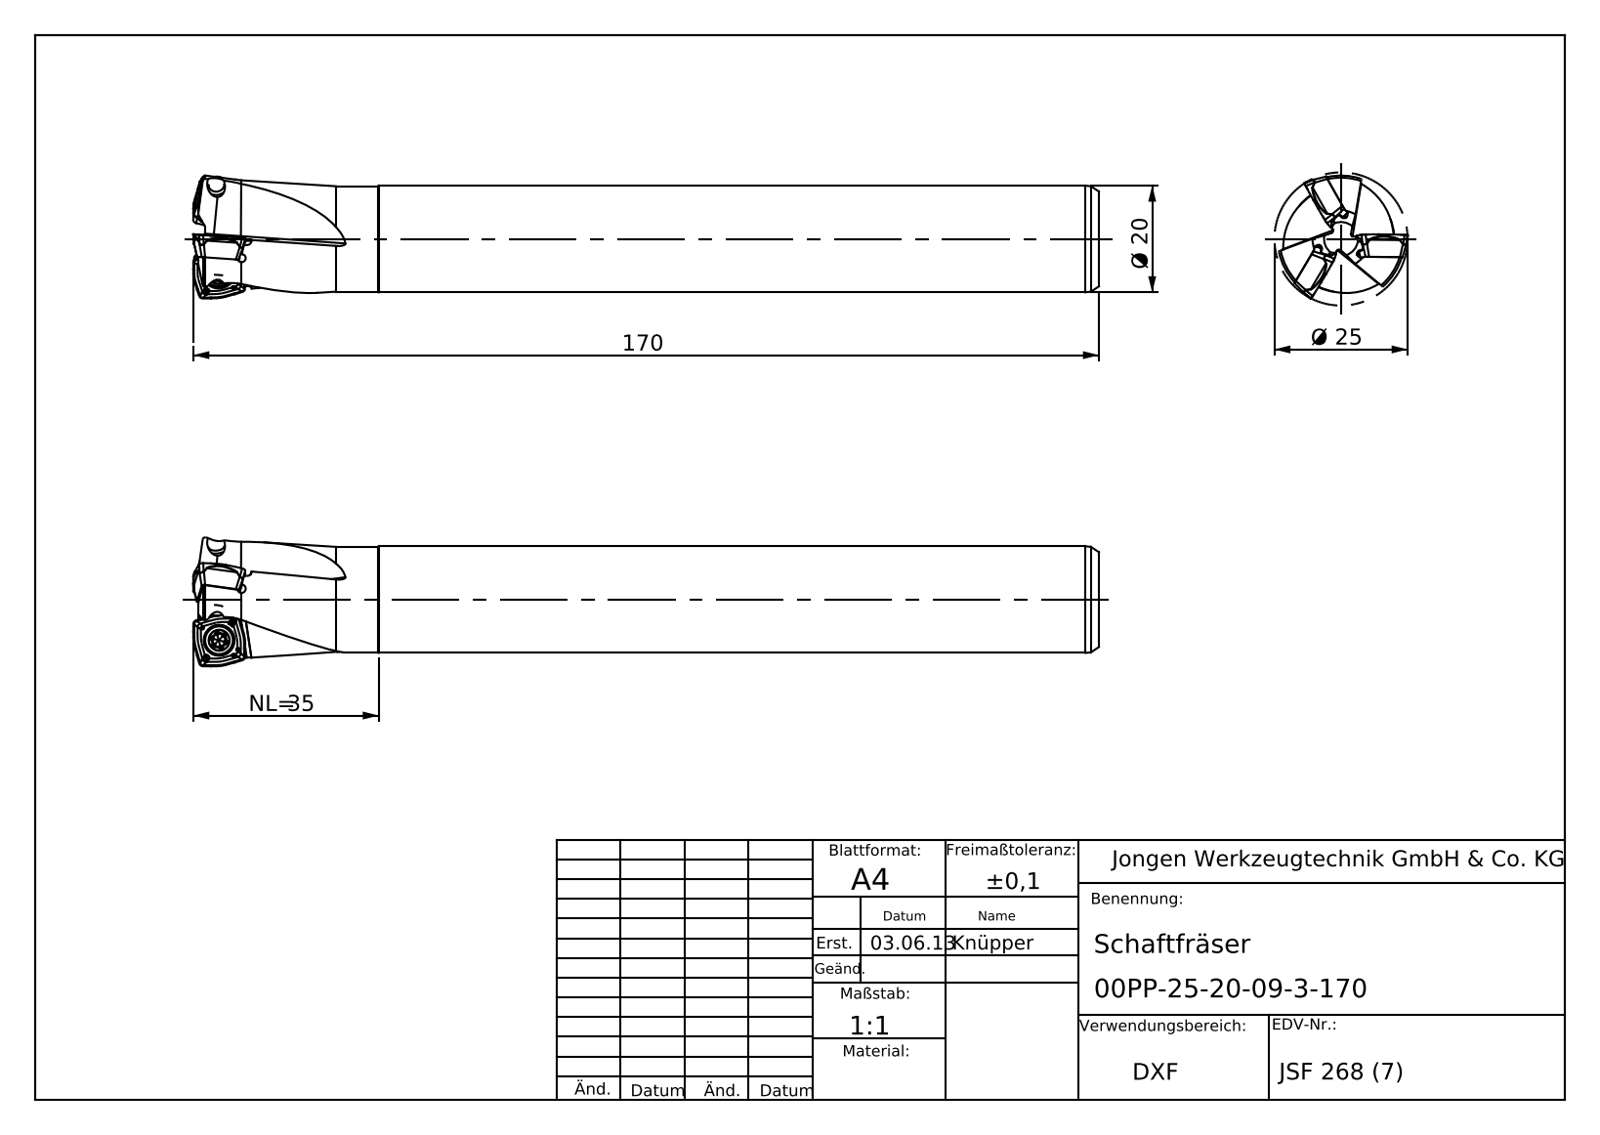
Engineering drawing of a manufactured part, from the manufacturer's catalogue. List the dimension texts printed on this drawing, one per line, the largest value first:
170
NL= 35
Ø 25
Ø 20
